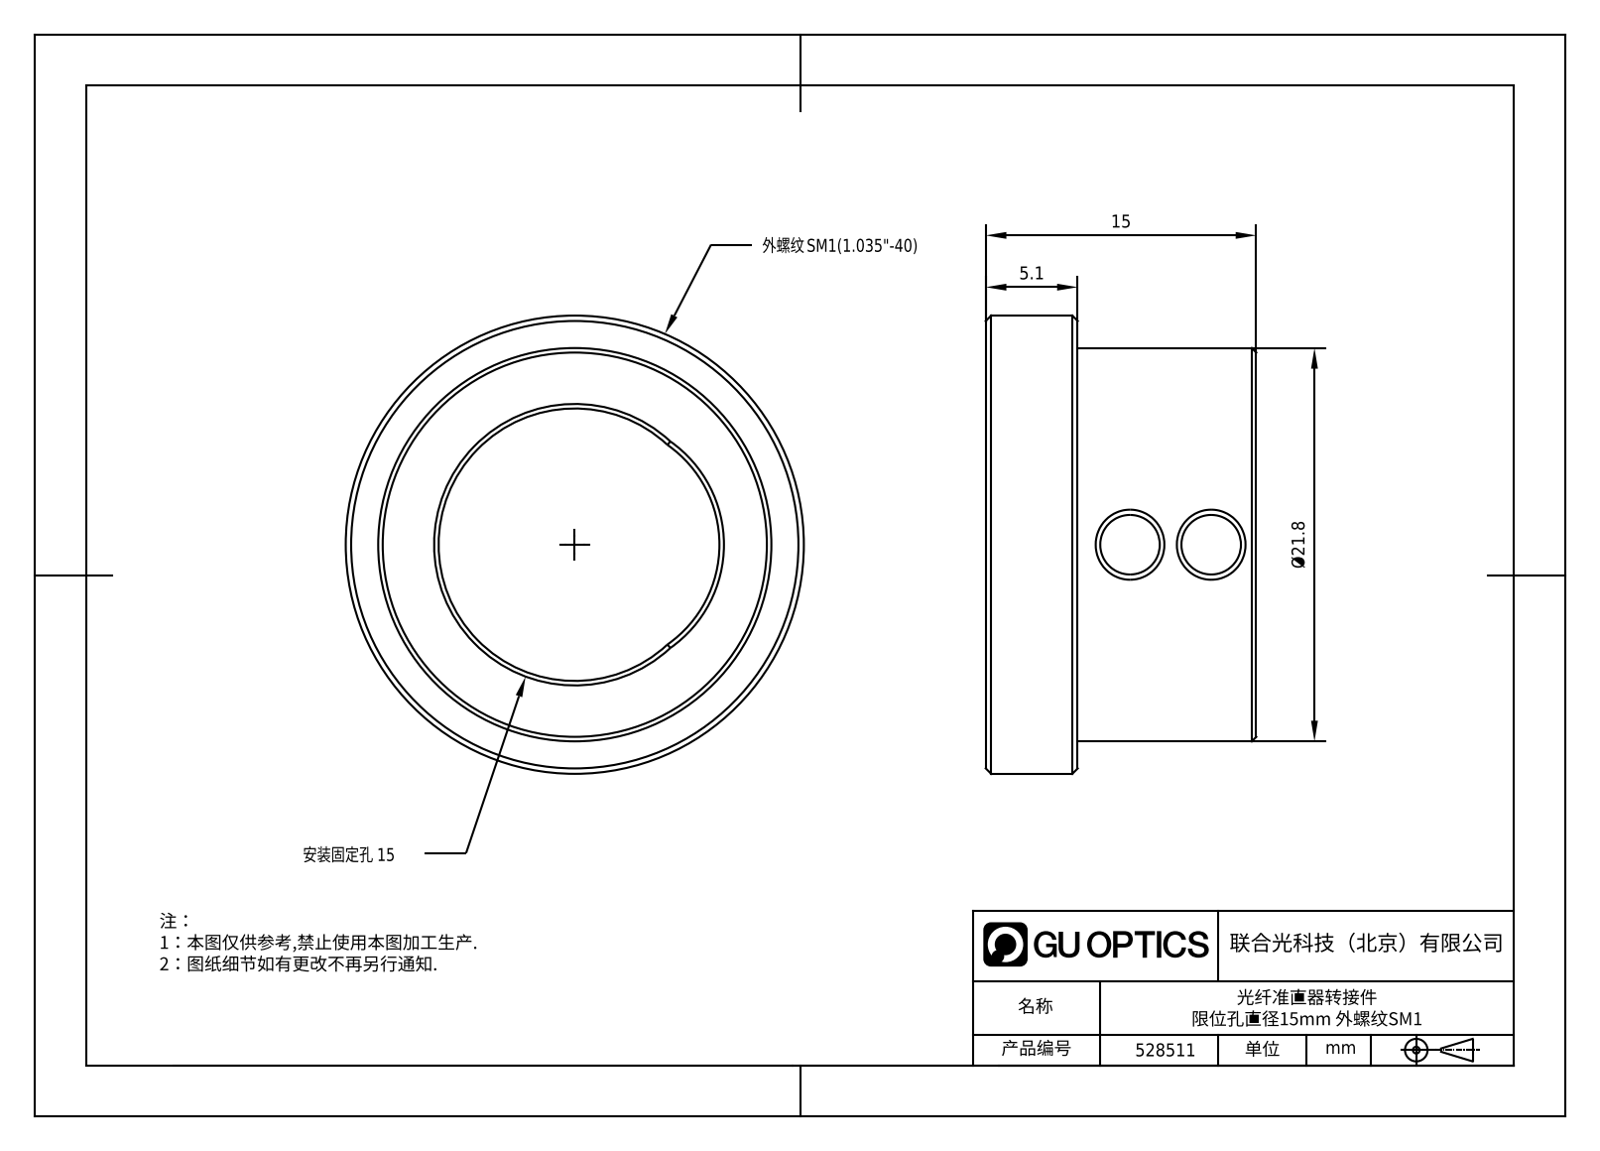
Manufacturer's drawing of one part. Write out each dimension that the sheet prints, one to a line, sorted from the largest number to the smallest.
Ø21.8
15
5.1
